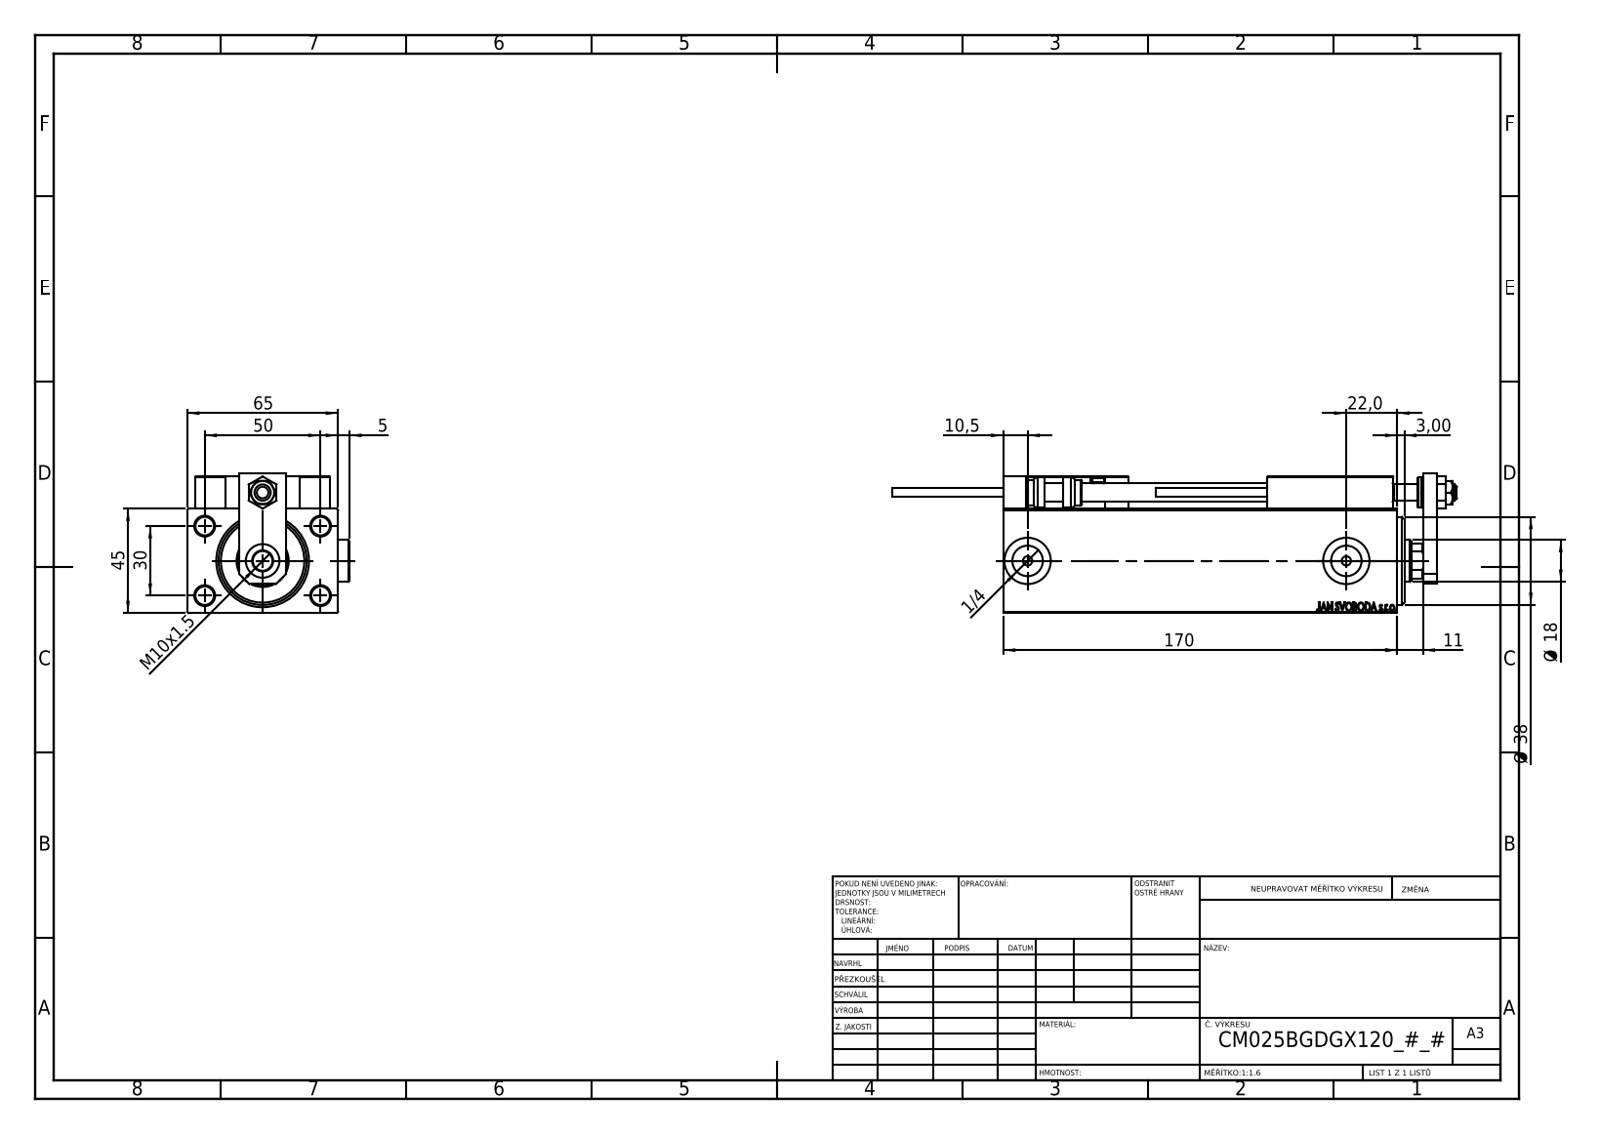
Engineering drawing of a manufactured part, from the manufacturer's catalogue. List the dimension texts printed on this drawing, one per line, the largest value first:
170
65
50
45
Ø 38
30
22,0
Ø 18
11
10,5
M10x1.5
5
3,00
1/4
